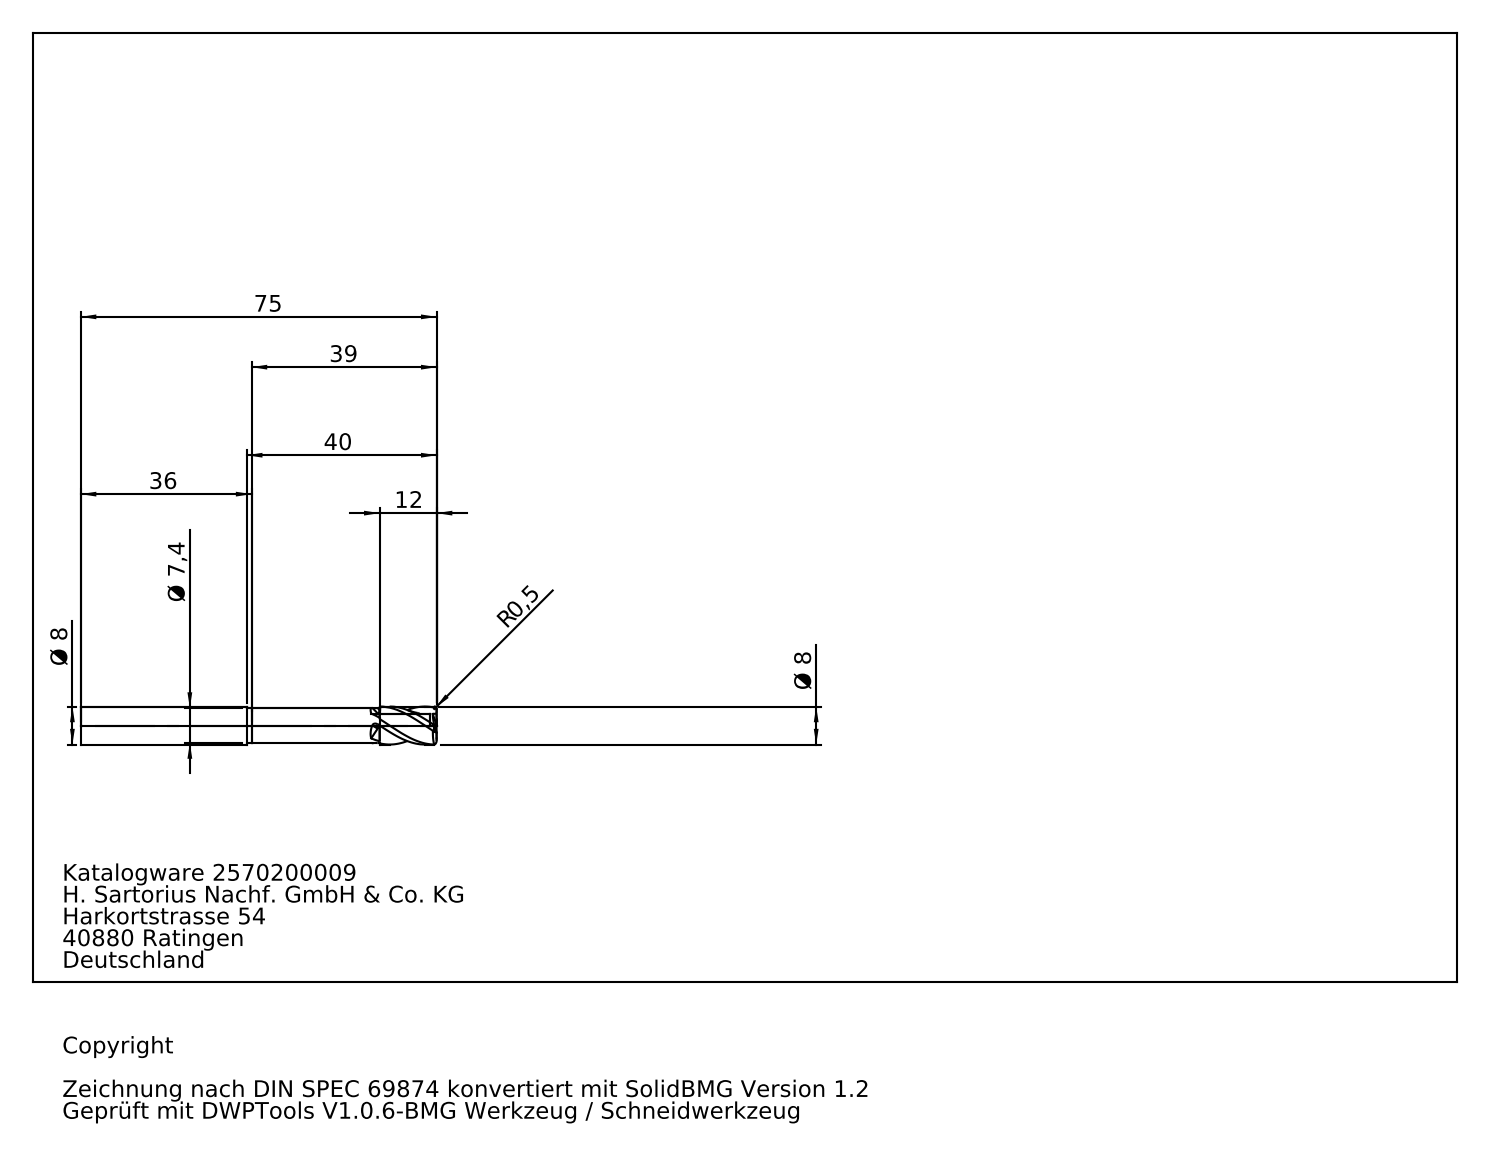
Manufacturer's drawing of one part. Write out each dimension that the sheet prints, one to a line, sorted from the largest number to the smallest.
75
40
39
36
12
Ø 8
Ø 8
Ø 7,4
R 0,5
